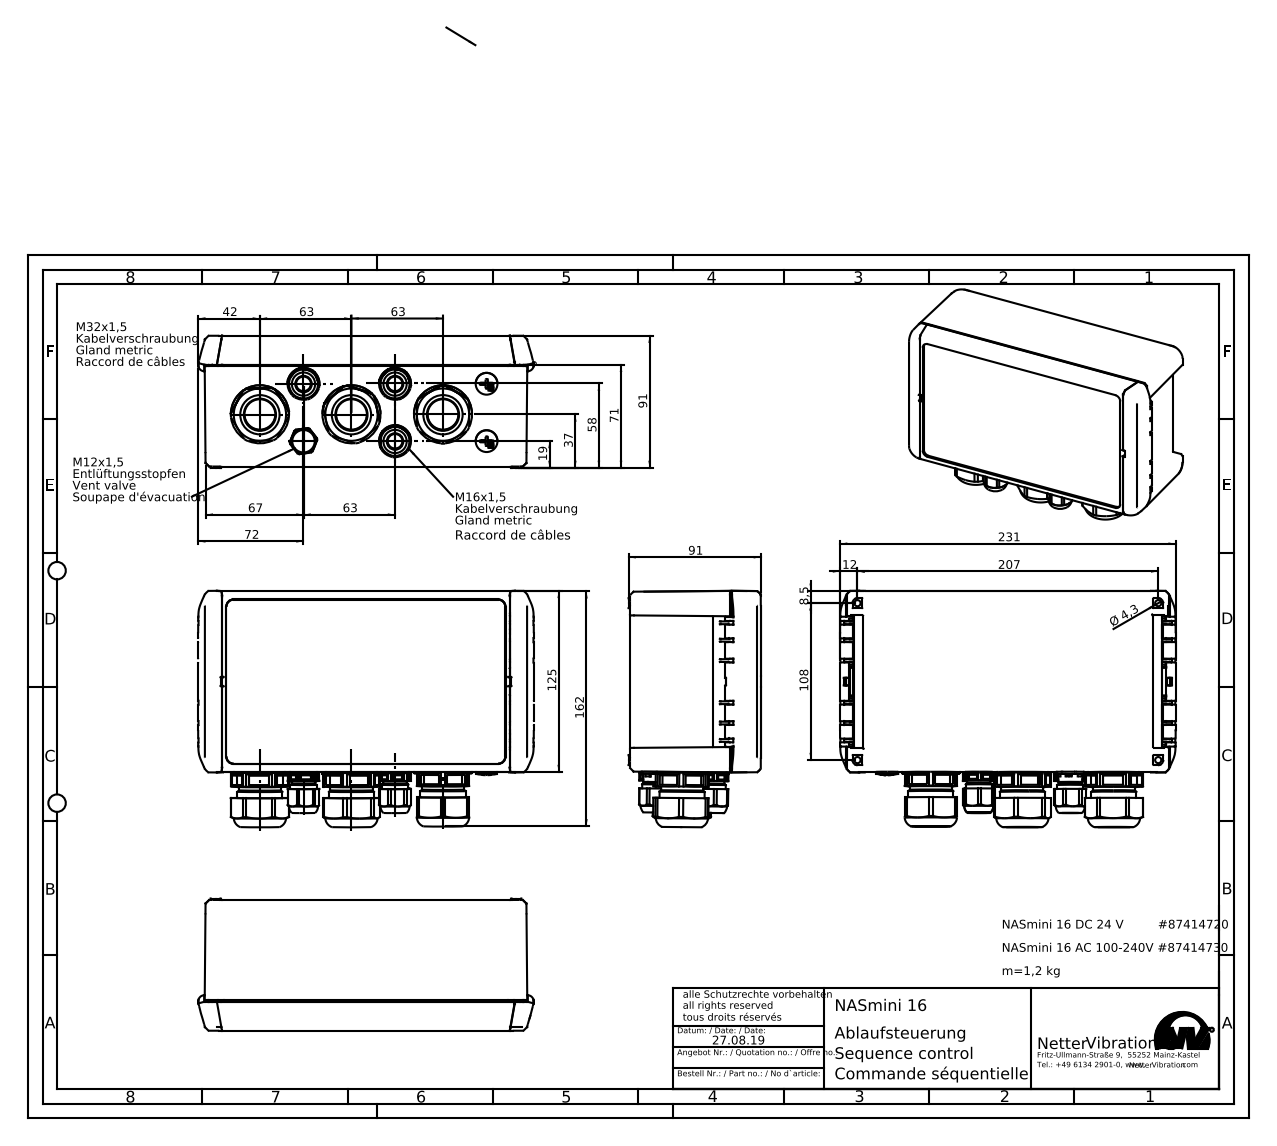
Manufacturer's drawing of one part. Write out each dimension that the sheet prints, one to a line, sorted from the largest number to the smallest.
231
207
162
125
108
91
91
72
71
67
63
63
63
58
42
37
19
12
8,5
Ø 4,3
